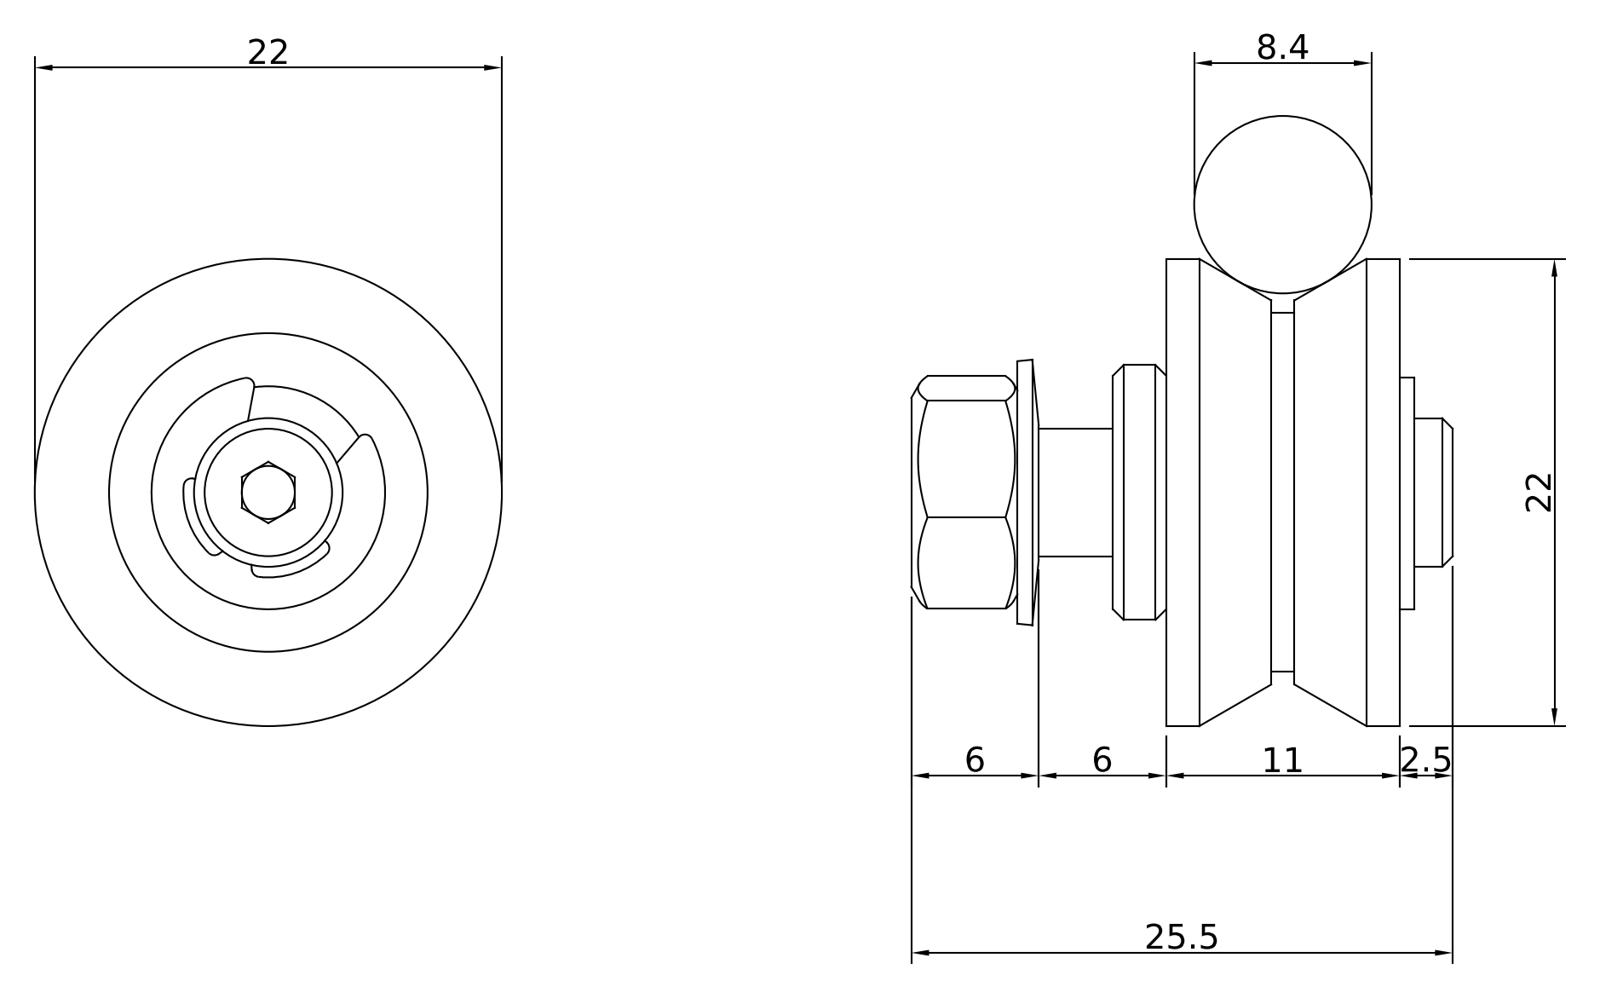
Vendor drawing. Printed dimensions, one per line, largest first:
25.5
22
22
11
8.4
6
6
2.5
